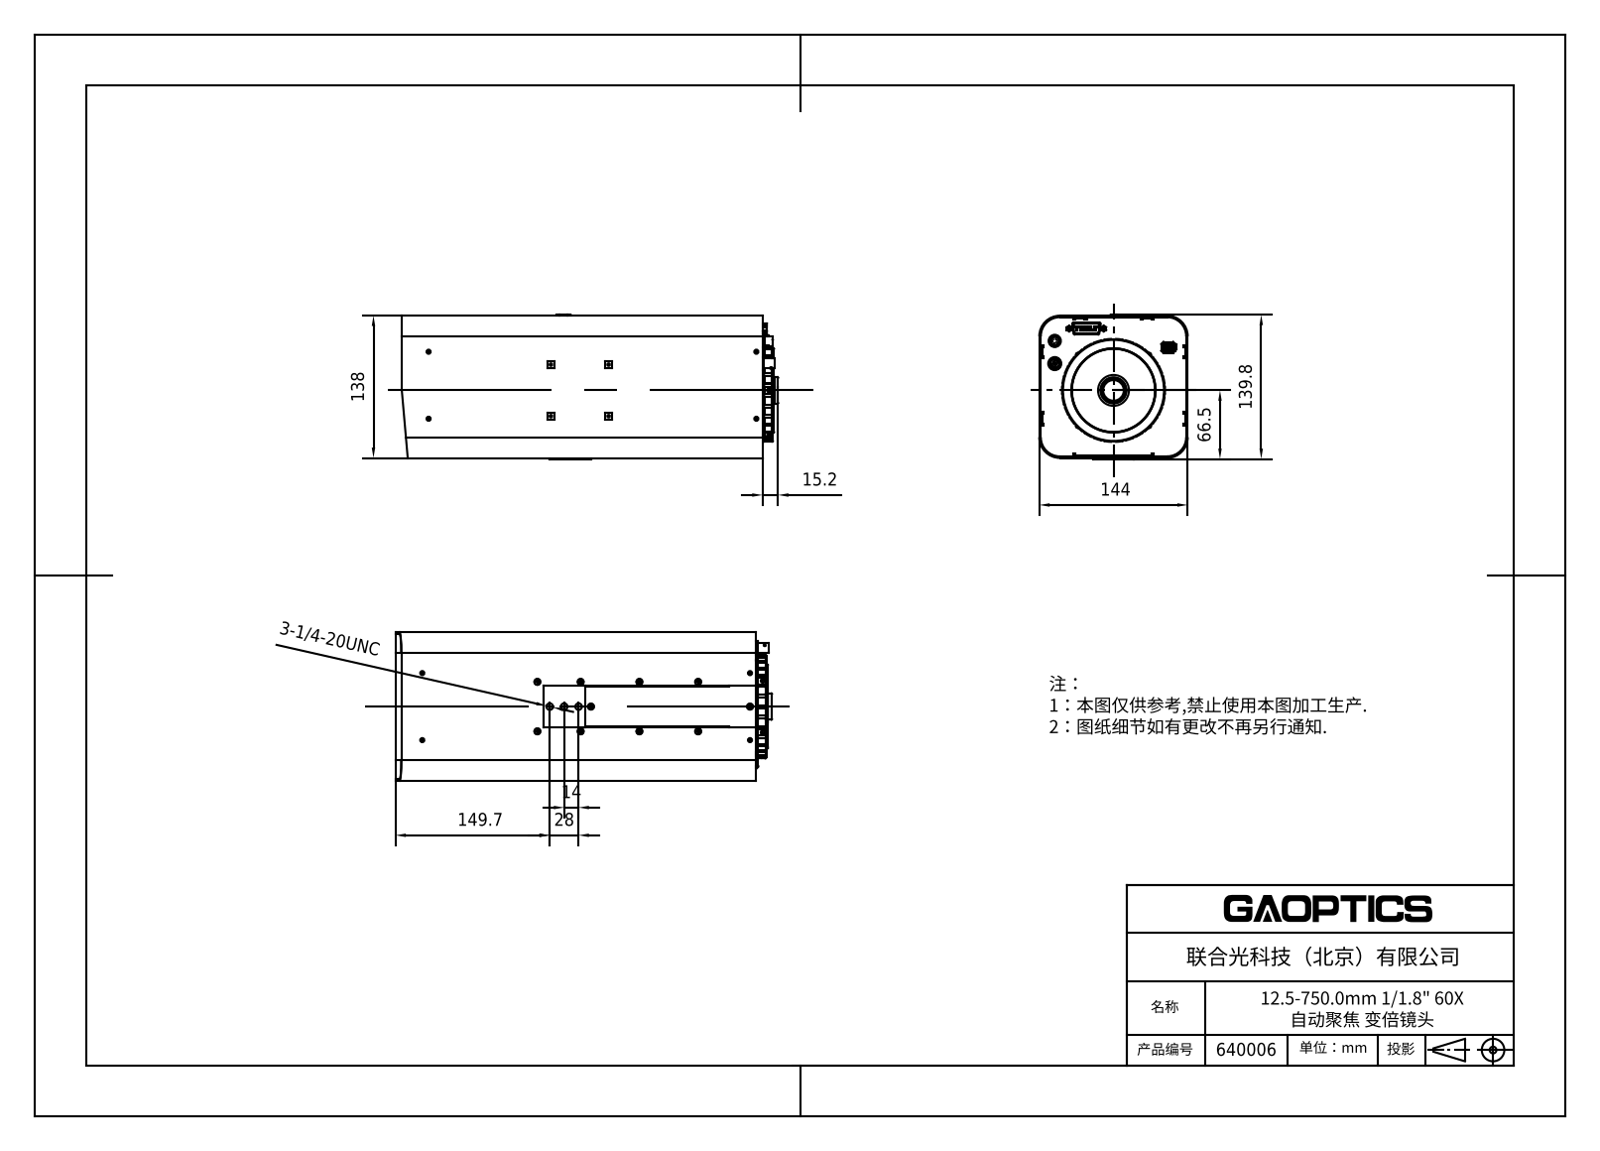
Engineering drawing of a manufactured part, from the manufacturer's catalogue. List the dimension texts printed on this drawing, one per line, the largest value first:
149.7
144
139.8
138
66.5
28
15.2
14
3-1/4-20UNC
